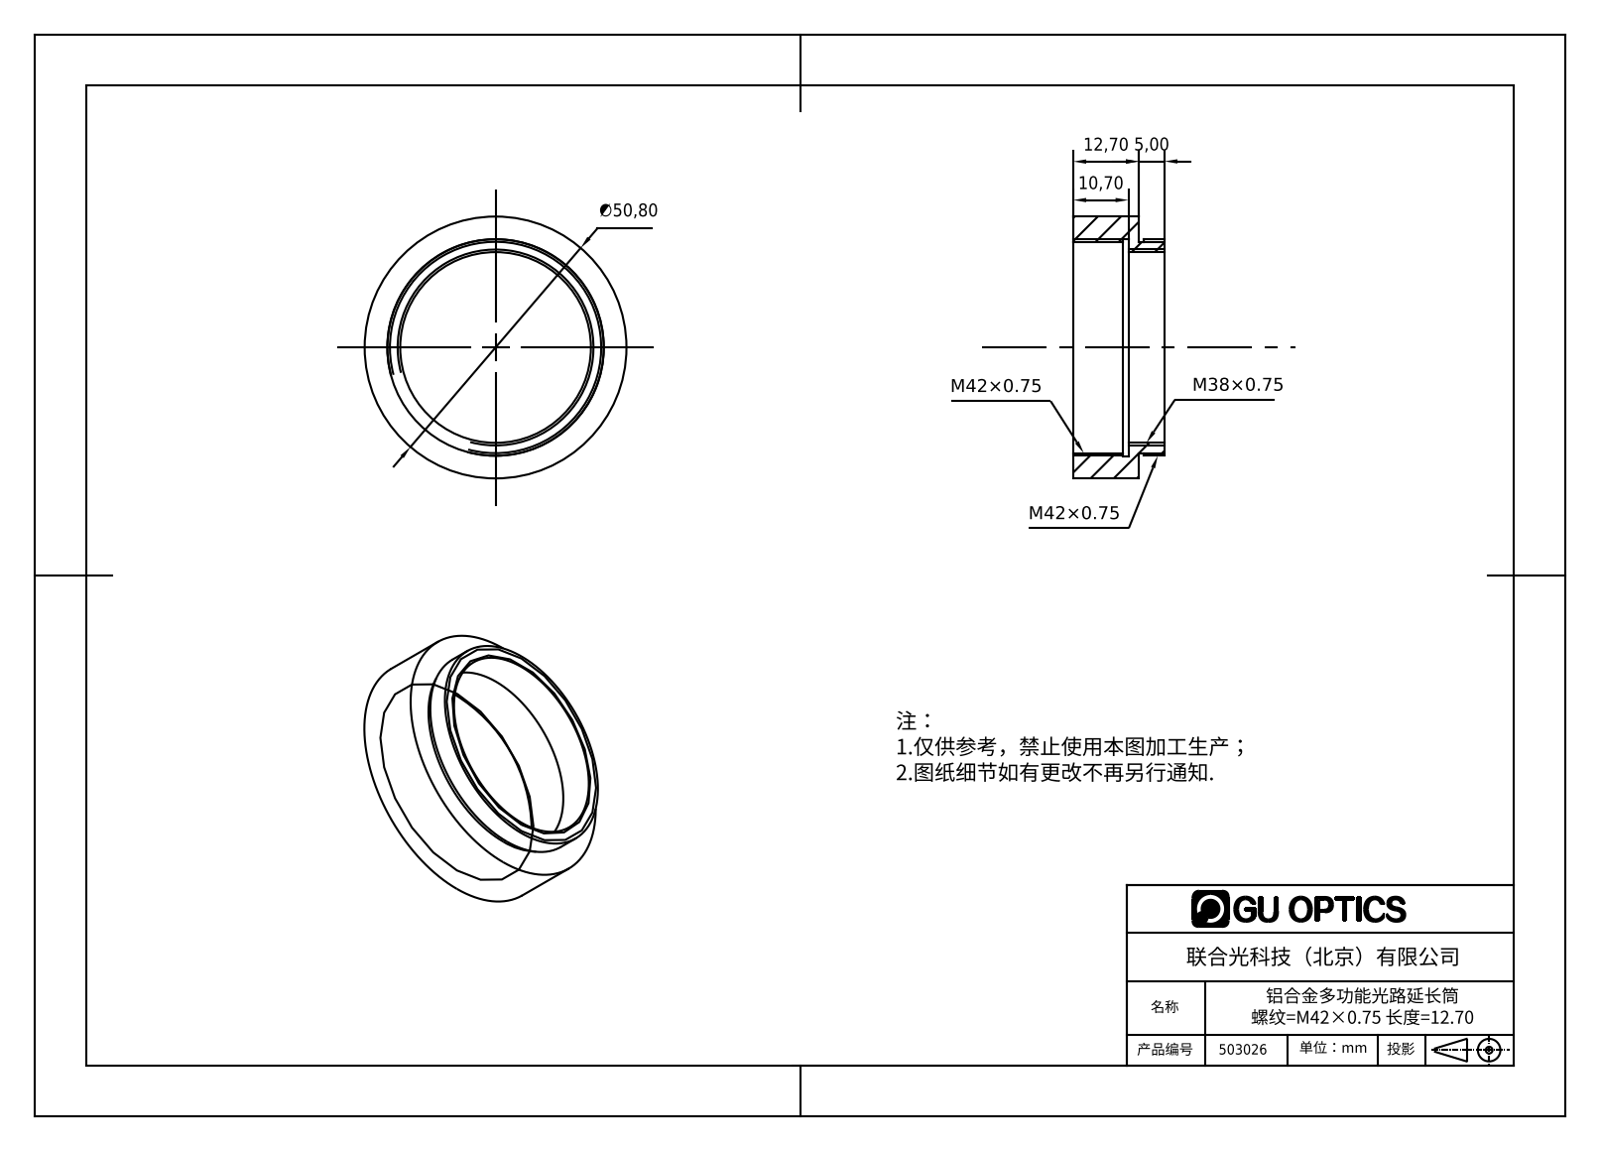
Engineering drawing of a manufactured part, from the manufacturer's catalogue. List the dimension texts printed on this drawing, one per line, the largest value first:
∅50,80
12,70
10,70
5,00
